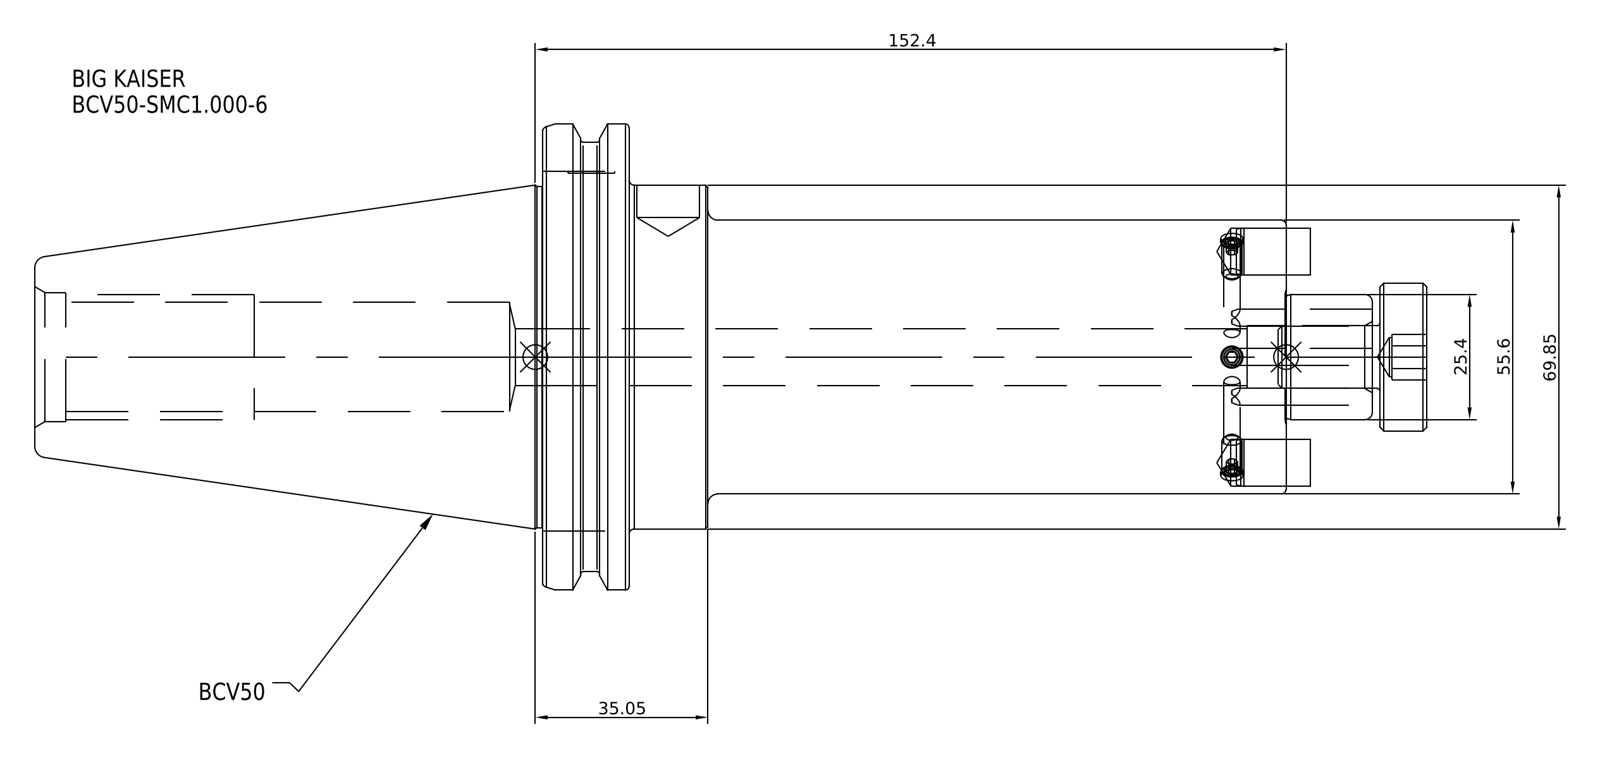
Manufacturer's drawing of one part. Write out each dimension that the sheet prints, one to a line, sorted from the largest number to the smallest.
152.4
69.85
55.6
35.05
25.4
